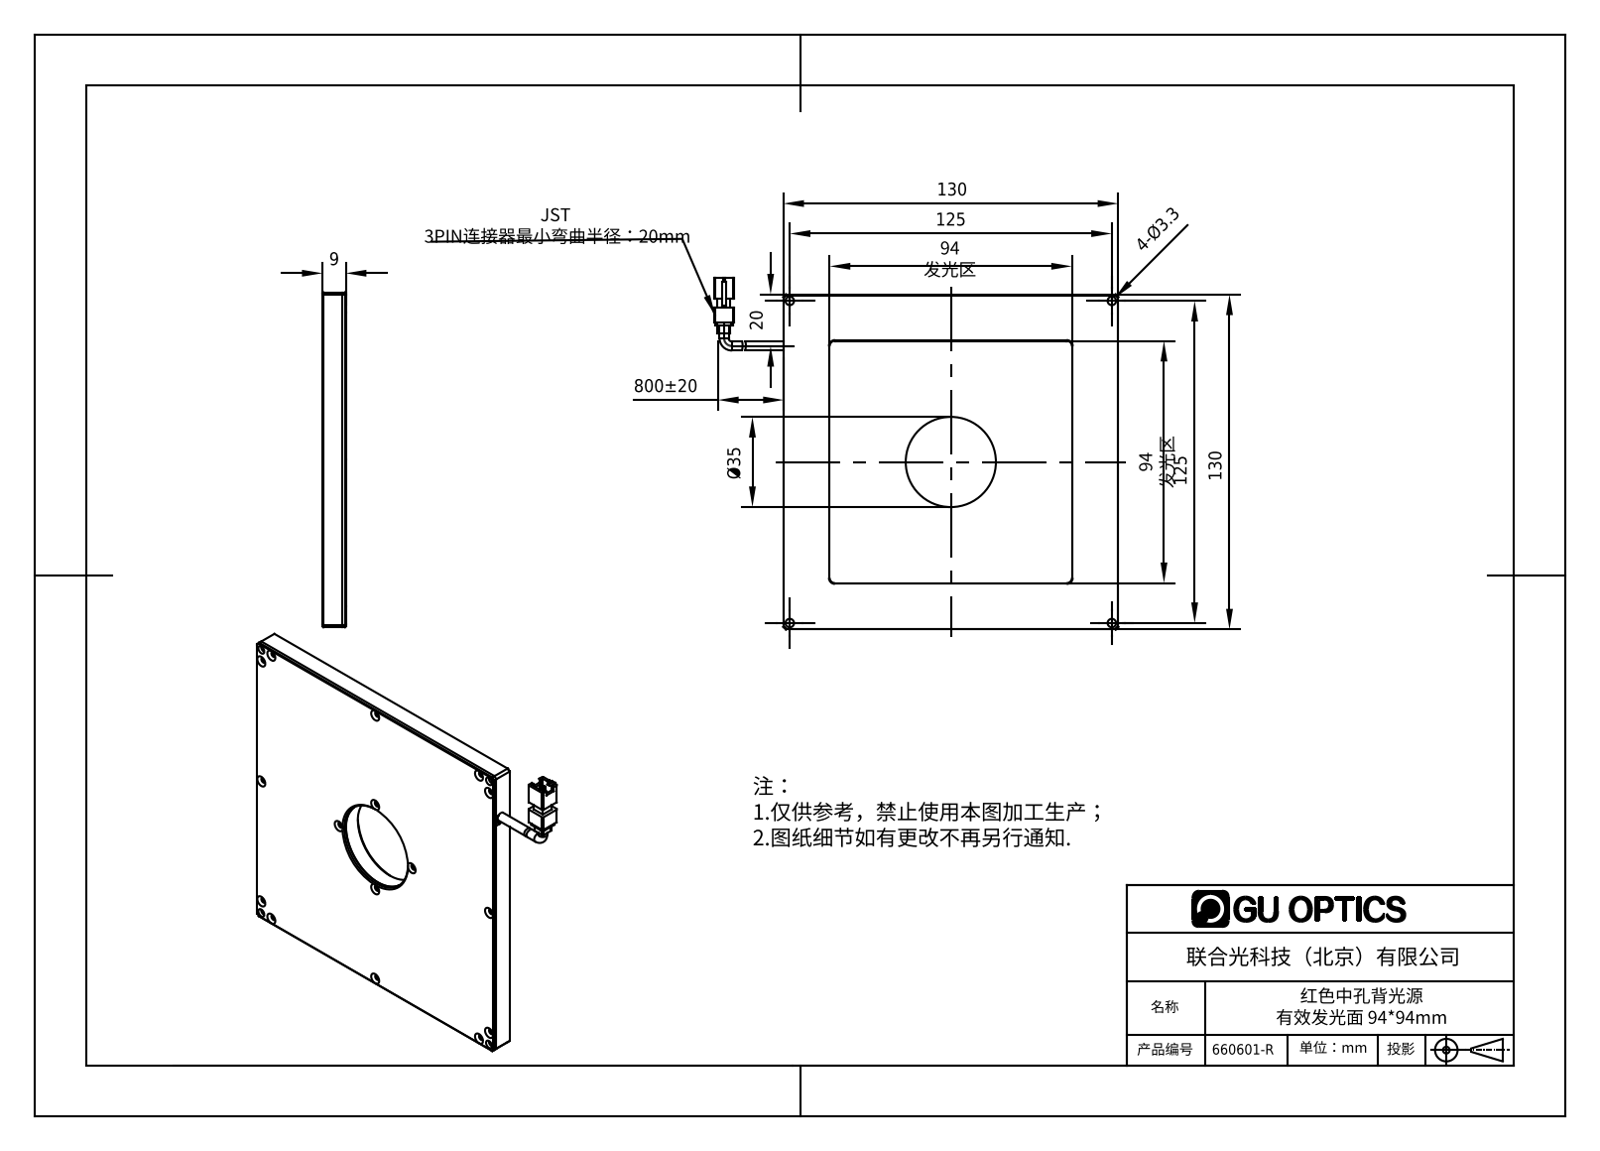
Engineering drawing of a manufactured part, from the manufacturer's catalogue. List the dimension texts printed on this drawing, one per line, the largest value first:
800±20
130
130
125
125
94 发光区
94 发光区
Ø35
20
9
4-Ø3.3
